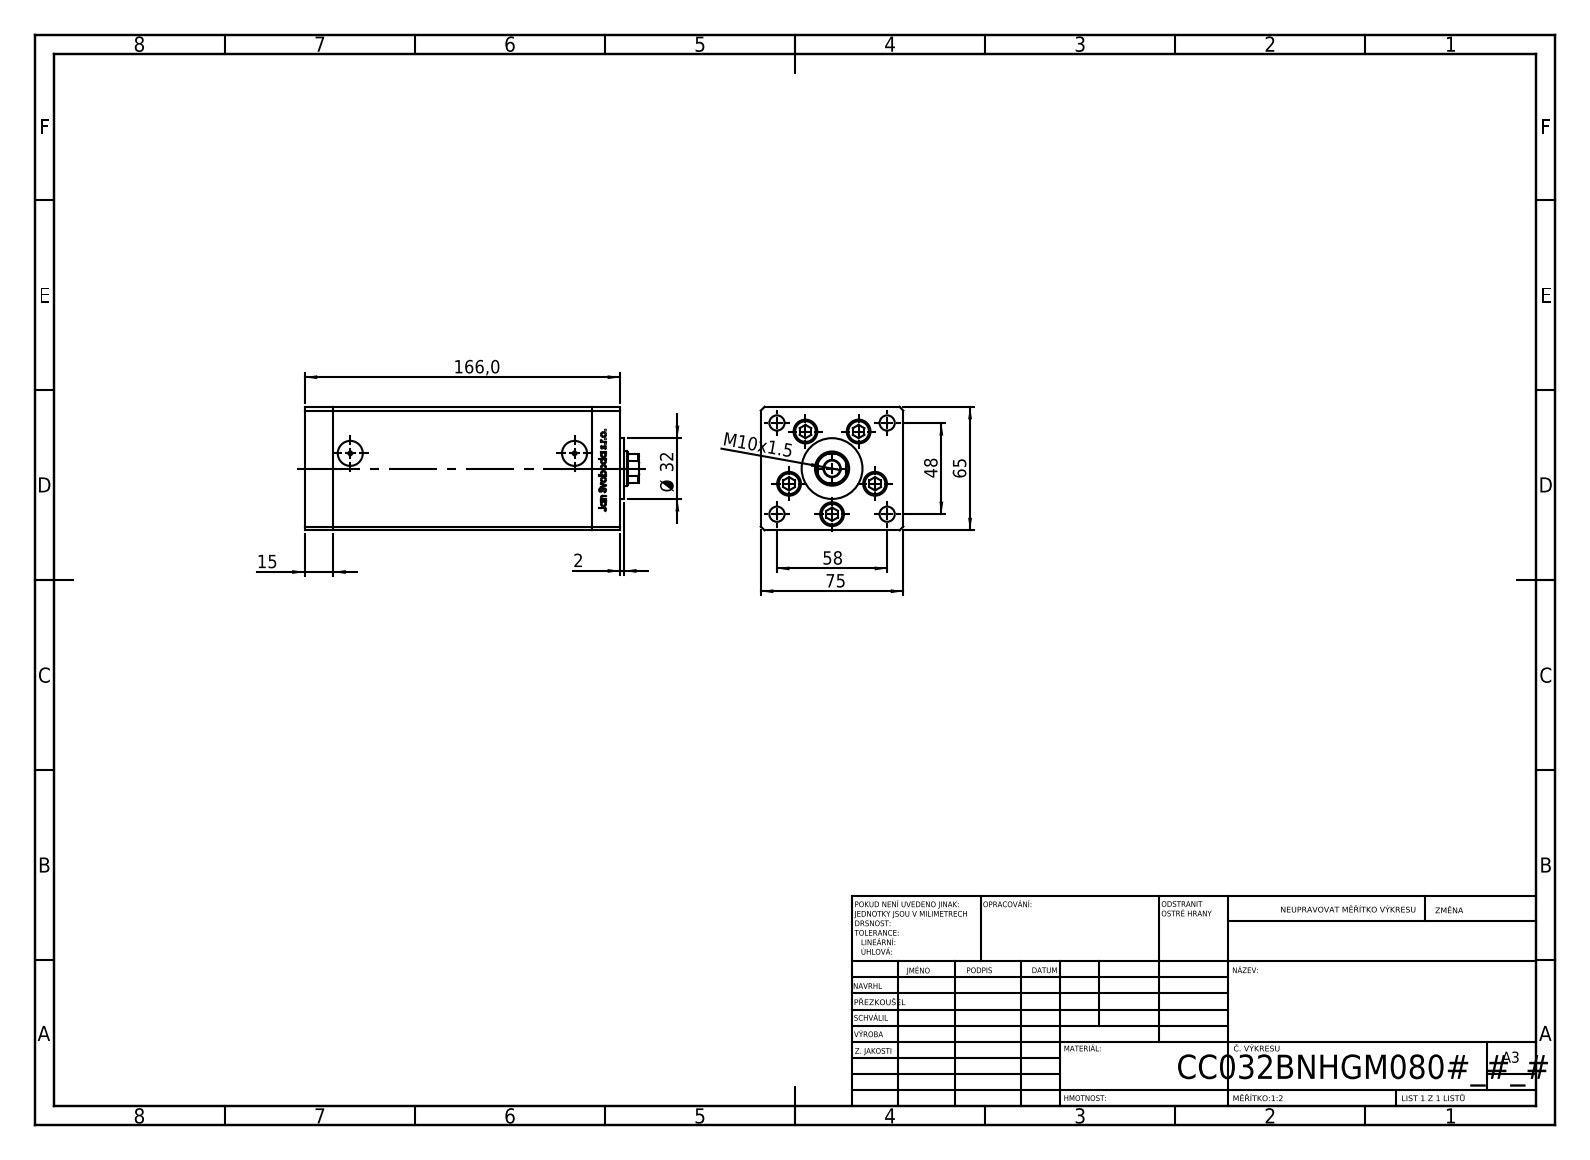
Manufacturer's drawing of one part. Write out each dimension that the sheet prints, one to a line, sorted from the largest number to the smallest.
166,0
75
65
58
48
Ø 32
15
M10x1.5
2
